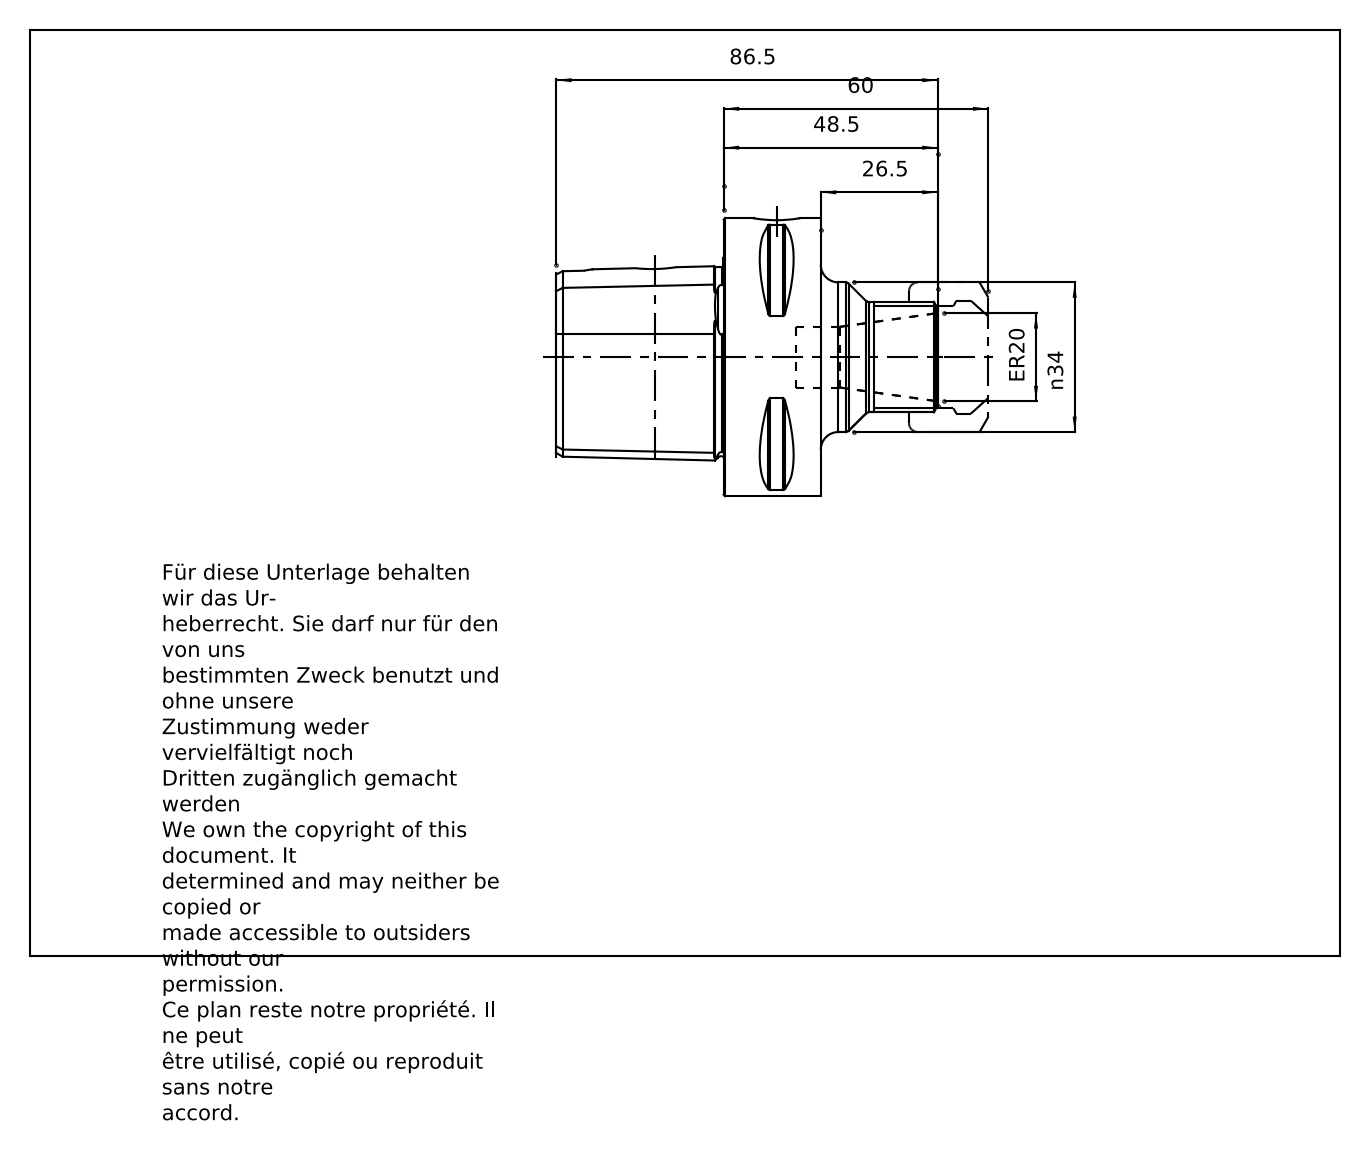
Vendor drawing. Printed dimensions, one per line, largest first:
86.5
60
48.5
n34
26.5
ER20
